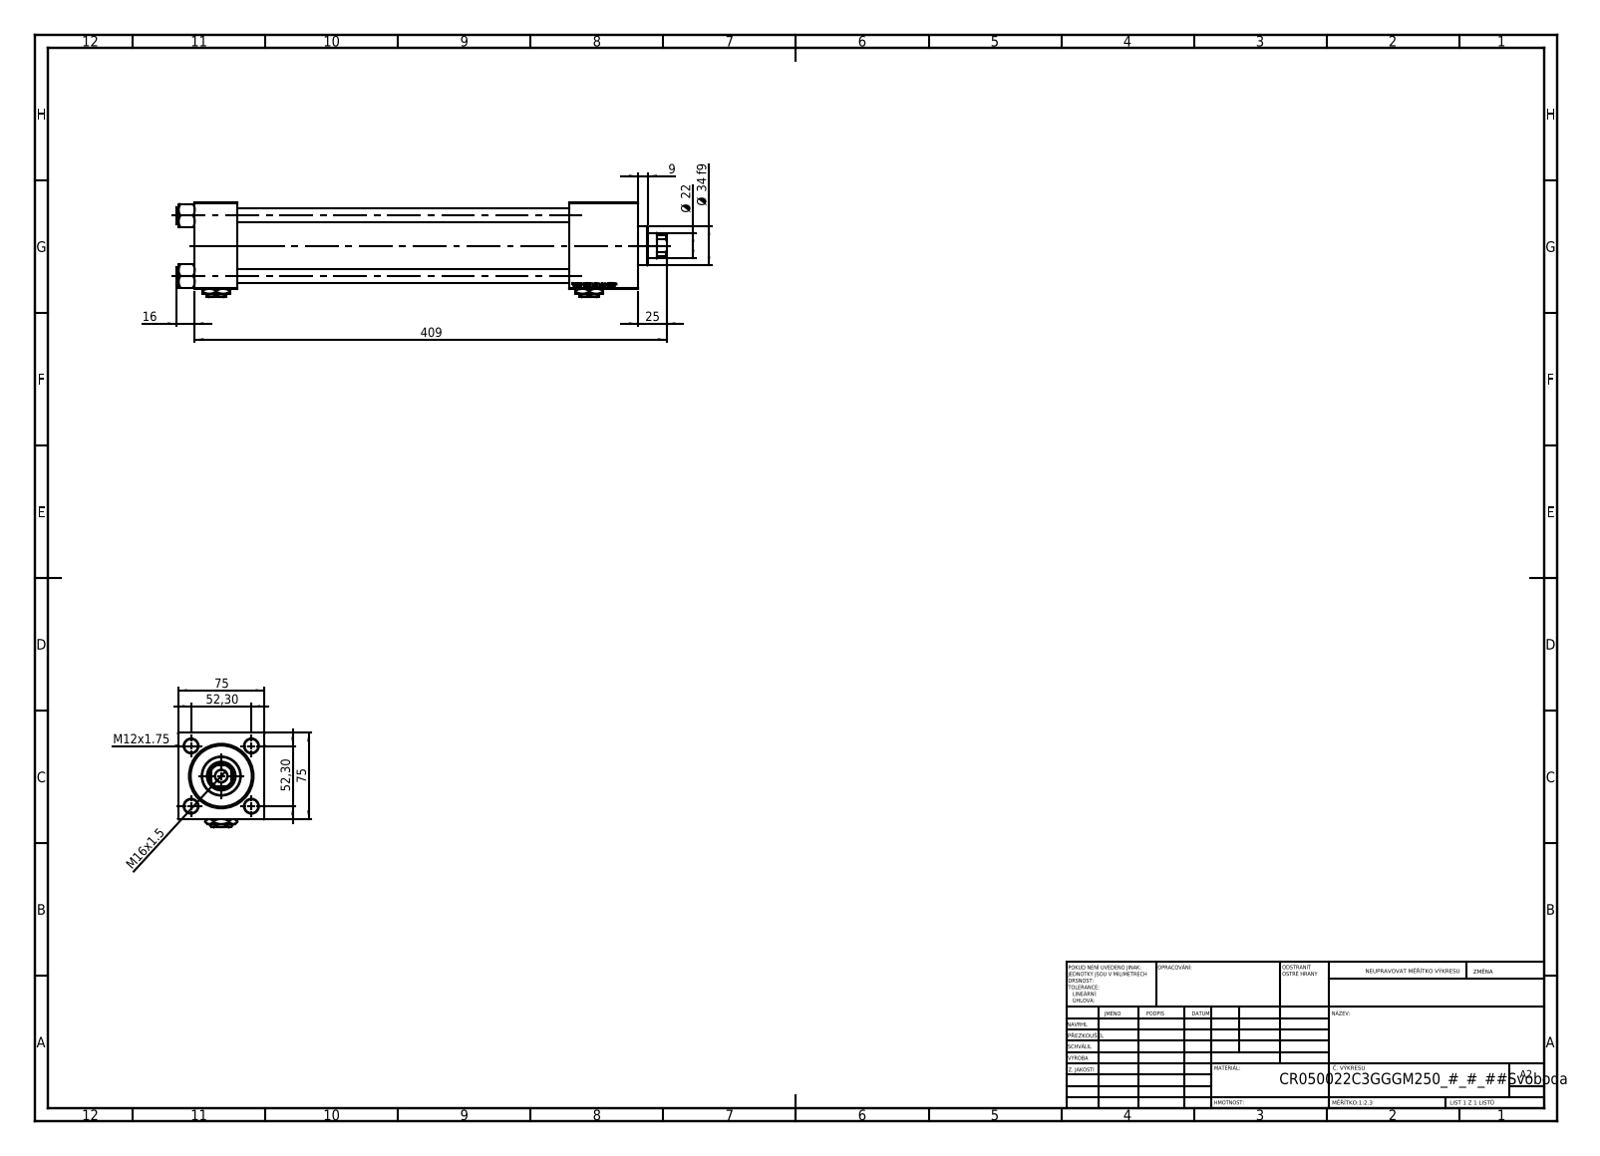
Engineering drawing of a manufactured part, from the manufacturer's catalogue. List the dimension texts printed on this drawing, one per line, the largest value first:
409
75
75
52,30
52,30
Ø 34 f9
25
Ø 22
16
M16x1.5
M12x1.75
9
